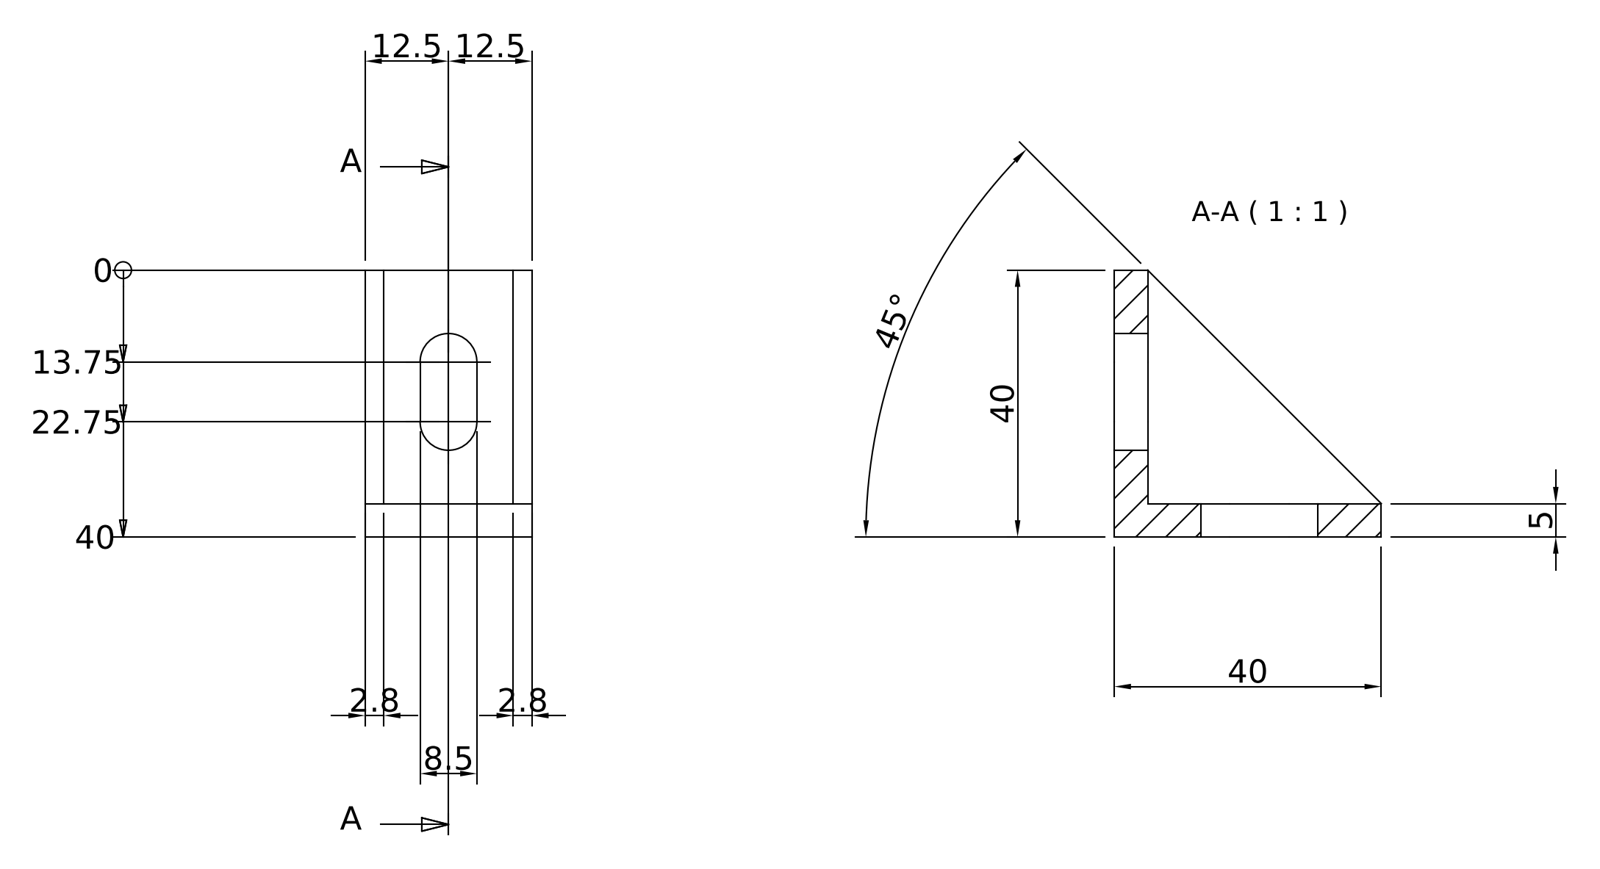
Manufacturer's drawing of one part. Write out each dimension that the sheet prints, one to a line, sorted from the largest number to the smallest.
45°
40
40
40
22.75
13.75
12.5
12.5
8.5
5
2.8
2.8
0
